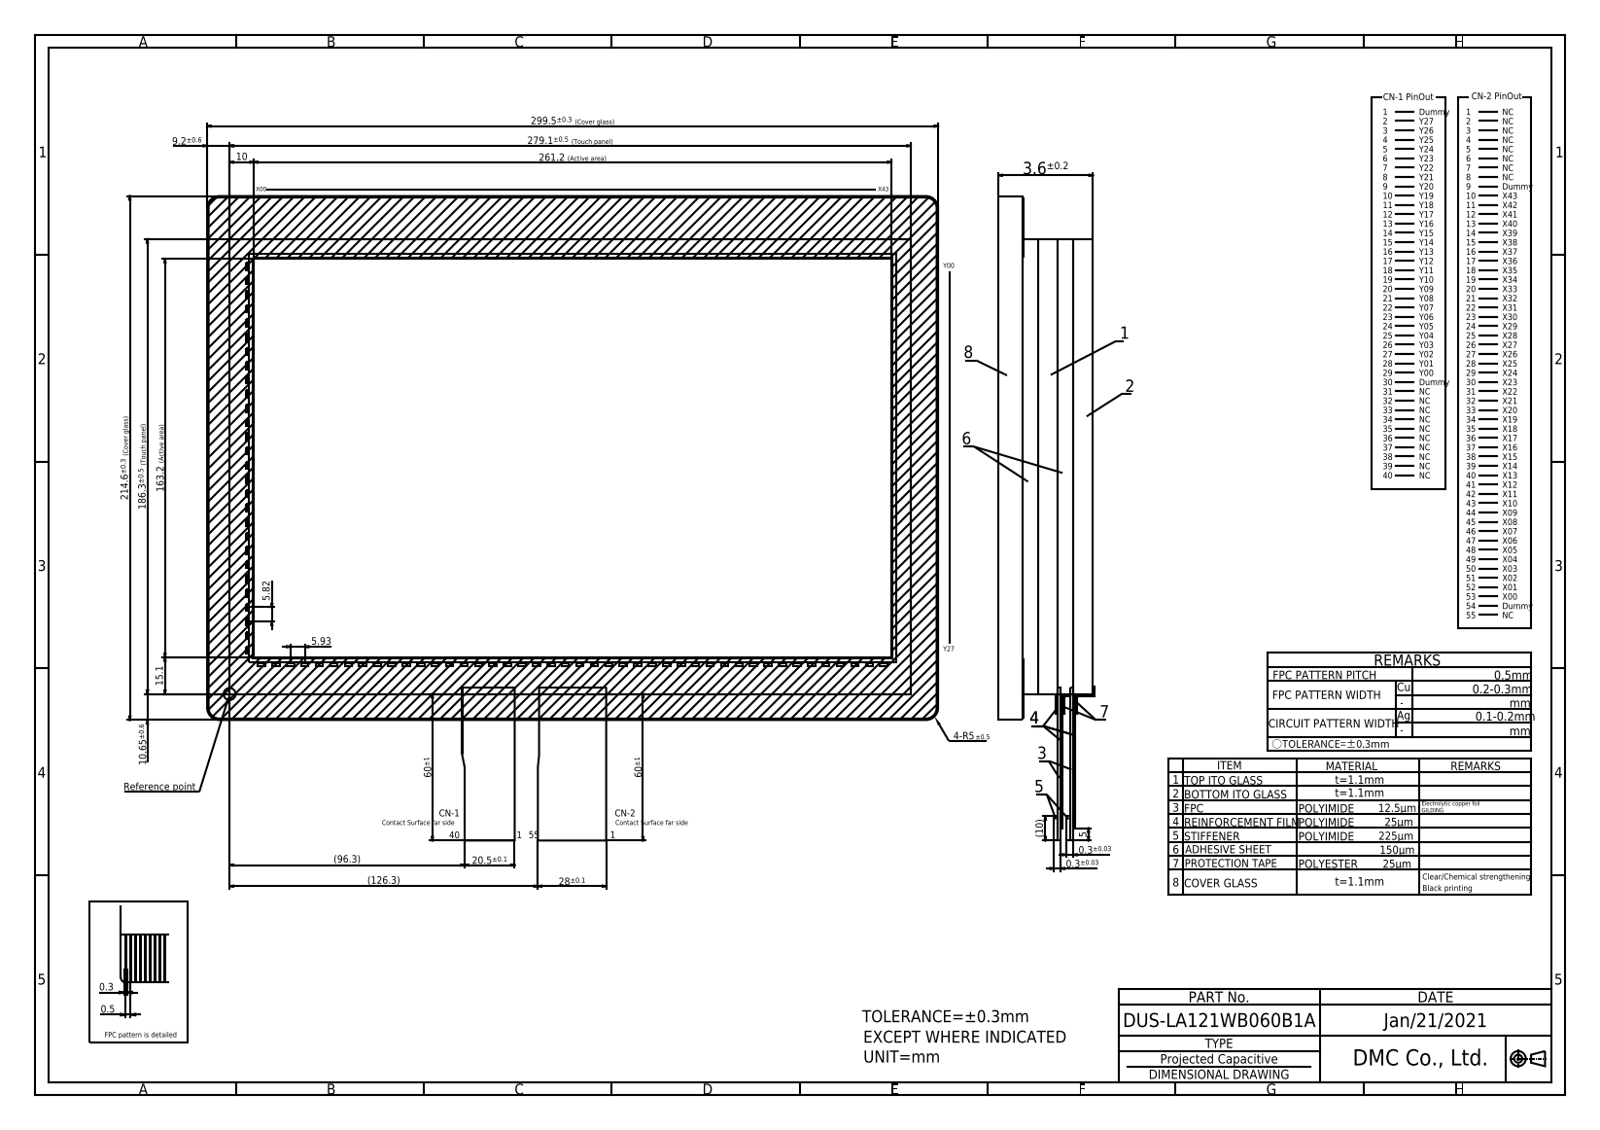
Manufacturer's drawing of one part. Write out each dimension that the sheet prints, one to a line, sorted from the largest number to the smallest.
299.5±0.3 (Cover glass)
279.1±0.5 (Touch panel)
261.2 (Active area)
214.6±0.3 (Cover glass)
186.3±0.5 (Touch panel)
163.2 (Active area)
(126.3)
(96.3)
60±1
60±1
28±0.1
20.5±0.1
15.1
10.65±0.6
10
(10)
9.2±0.6
5.93
5.82
5
3.6±0.2
0.5
0.3
0.3±0.03
0.3±0.03
